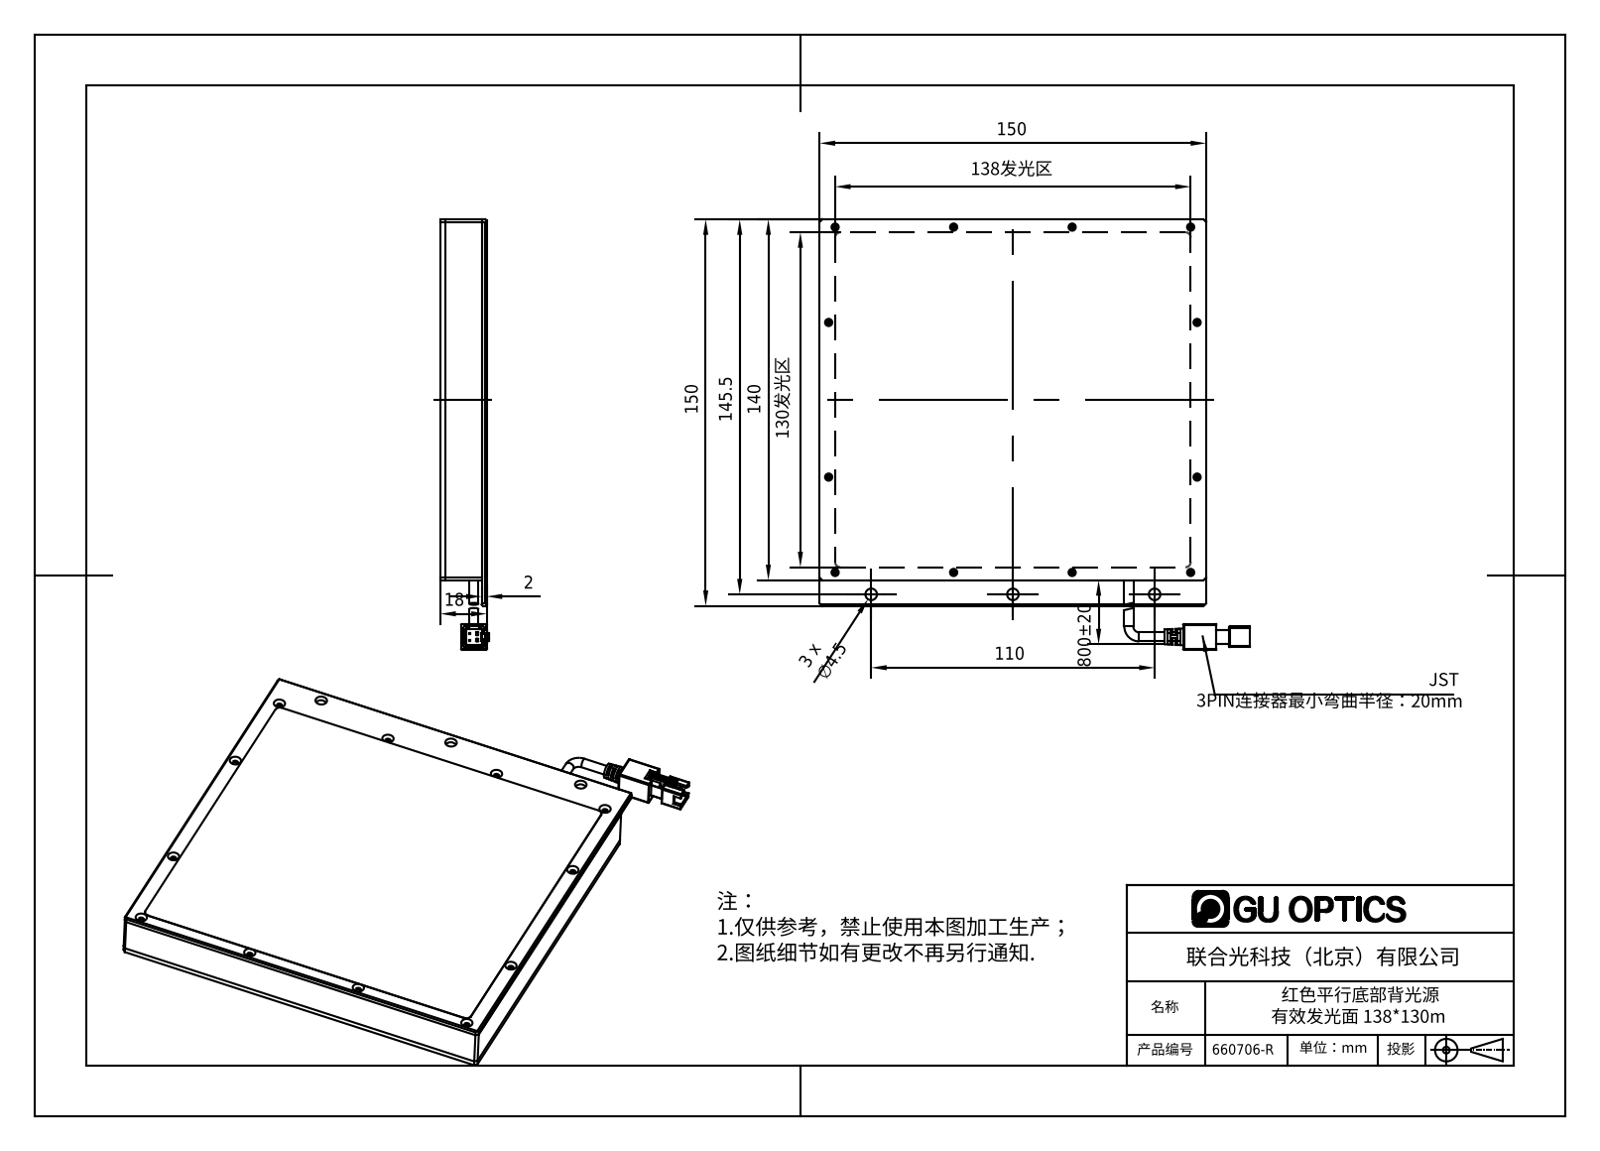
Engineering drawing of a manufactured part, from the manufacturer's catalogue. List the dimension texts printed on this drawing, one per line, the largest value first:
800±20
150
150
145.5
140
138发光区
130发光区
110
18
3 x ∅4.5
2
